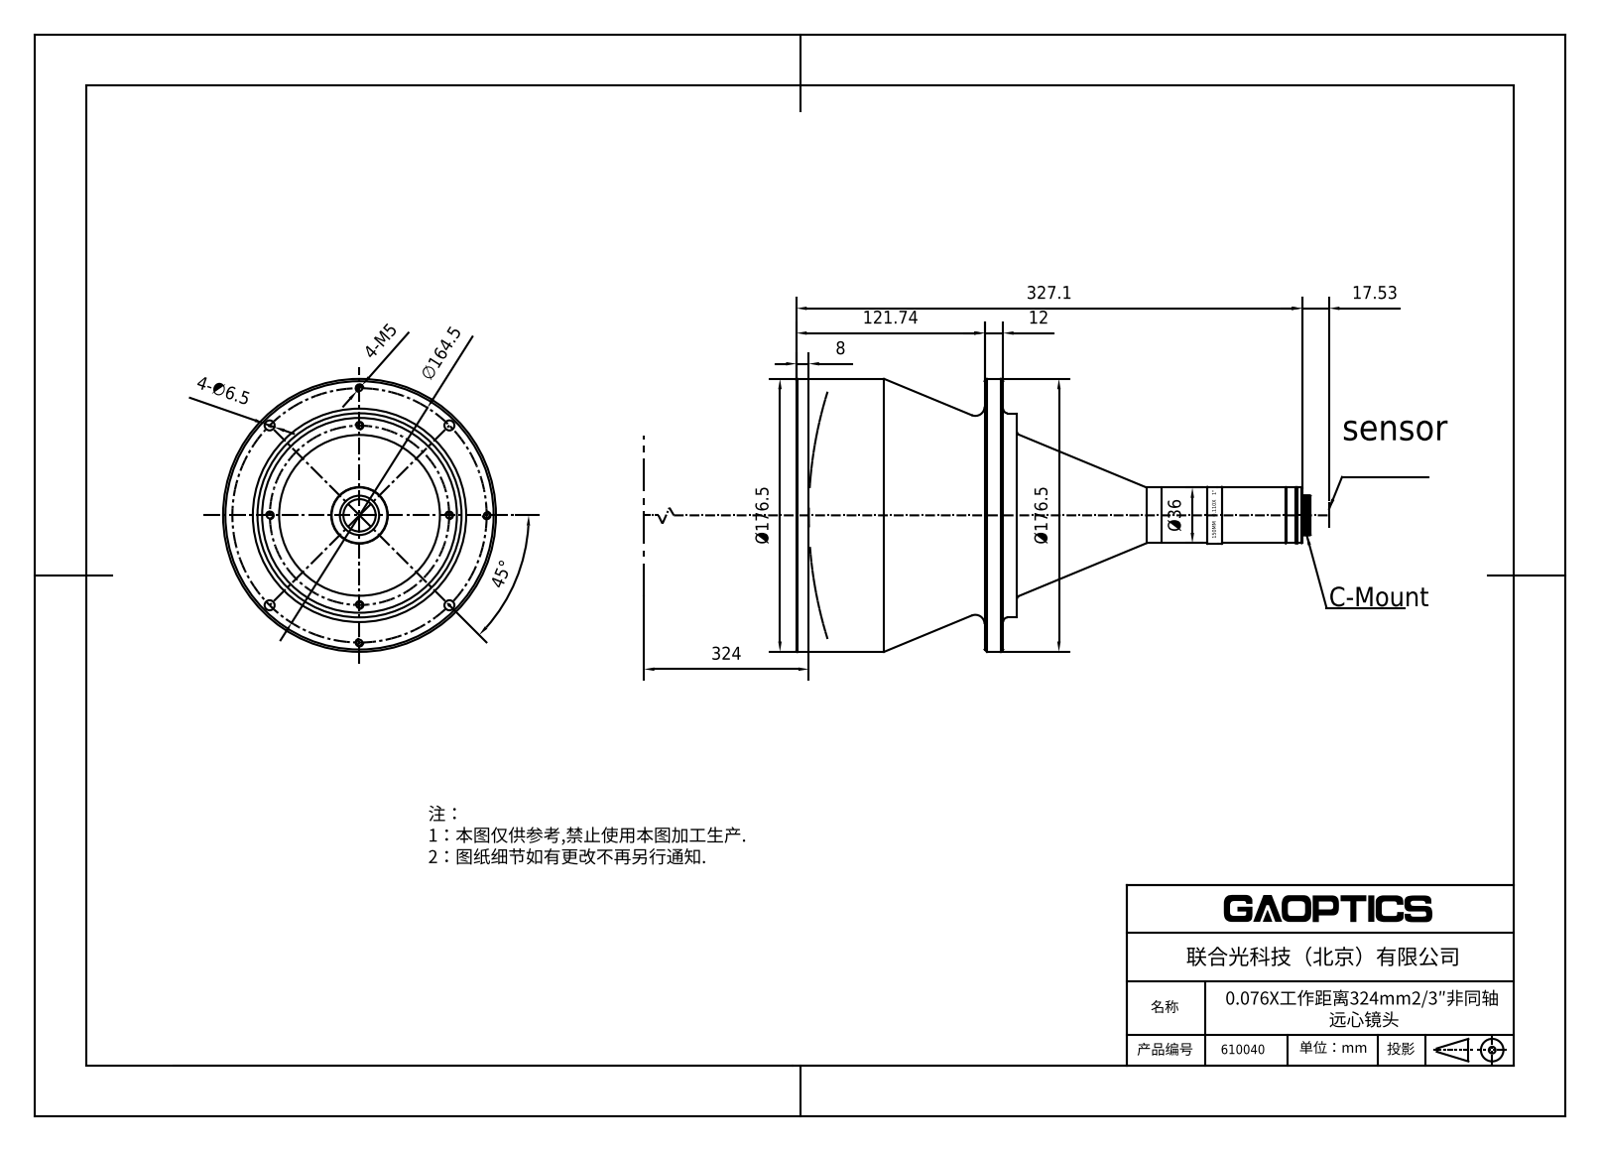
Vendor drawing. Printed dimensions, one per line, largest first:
327.1
324
Ø176.5
Ø176.5
∅164.5
121.74
45°
Ø36
17.53
12
8
4-∅6.5
4-M5
